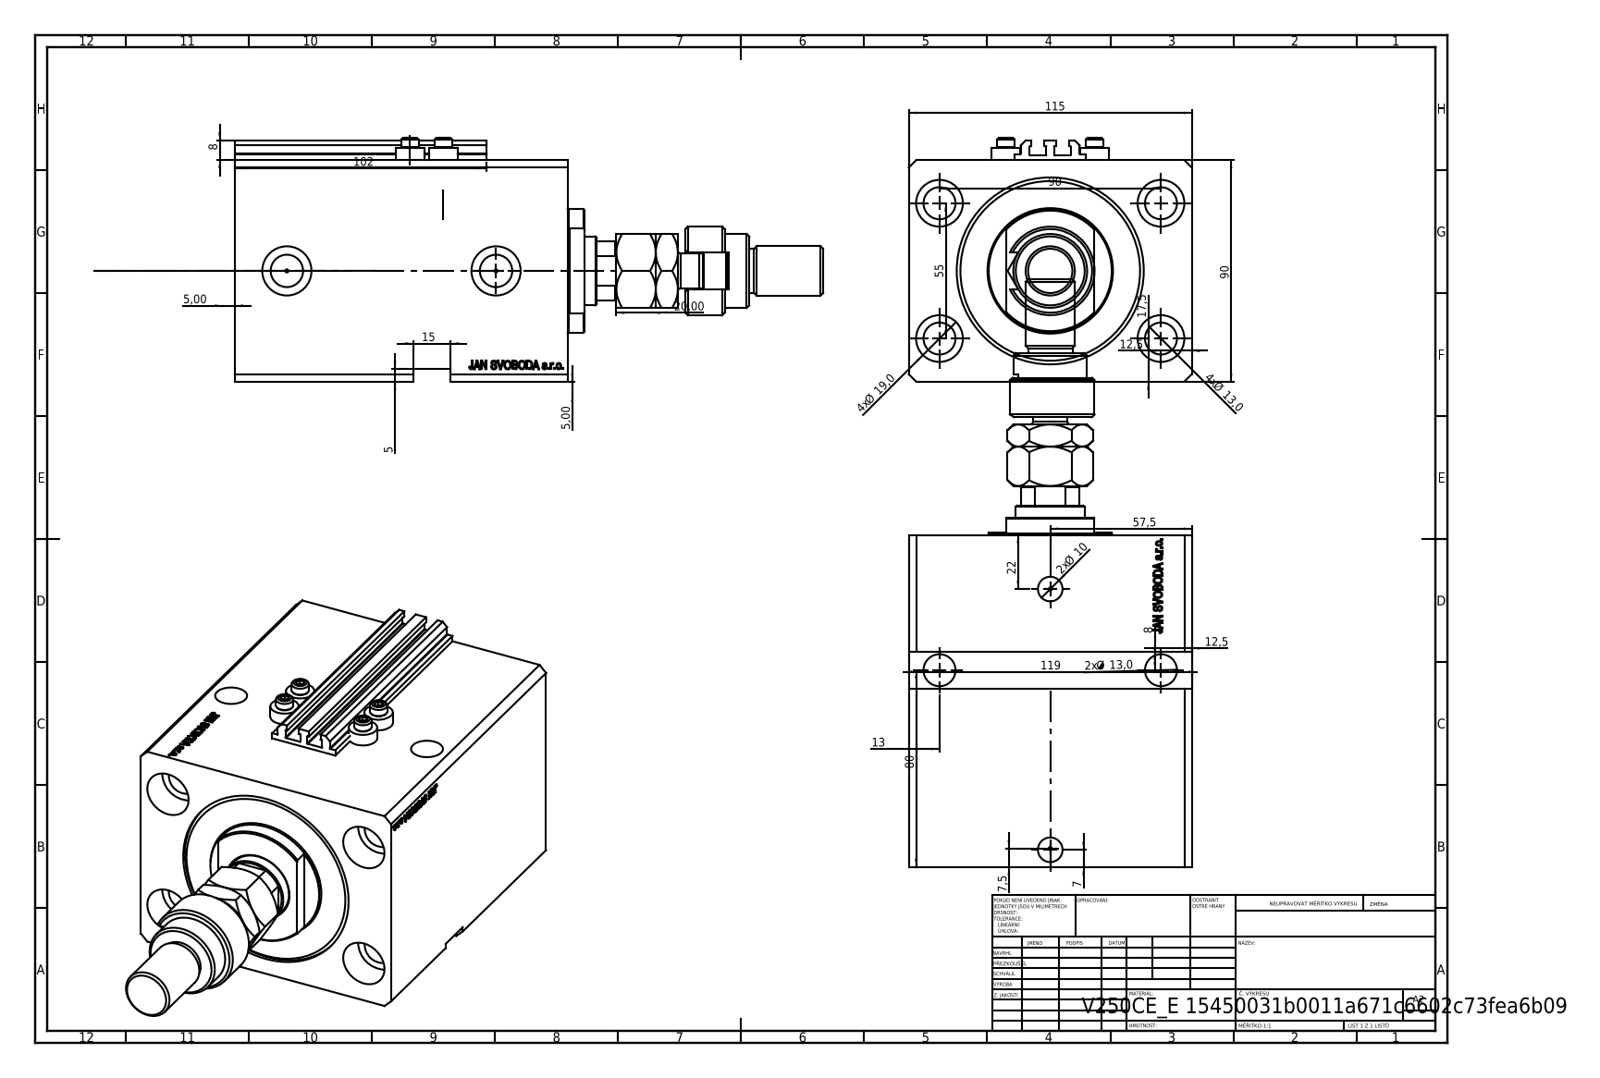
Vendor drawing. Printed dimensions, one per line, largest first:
119
115
102
90
90
80
57,5
55
22
20,00
4x Ø 19,0
17,5
15
4x Ø 13,0
2x Ø 13,0
13
12,5
12,5
2x Ø 10
8
8
7,5
7
5,00
5,00
5
